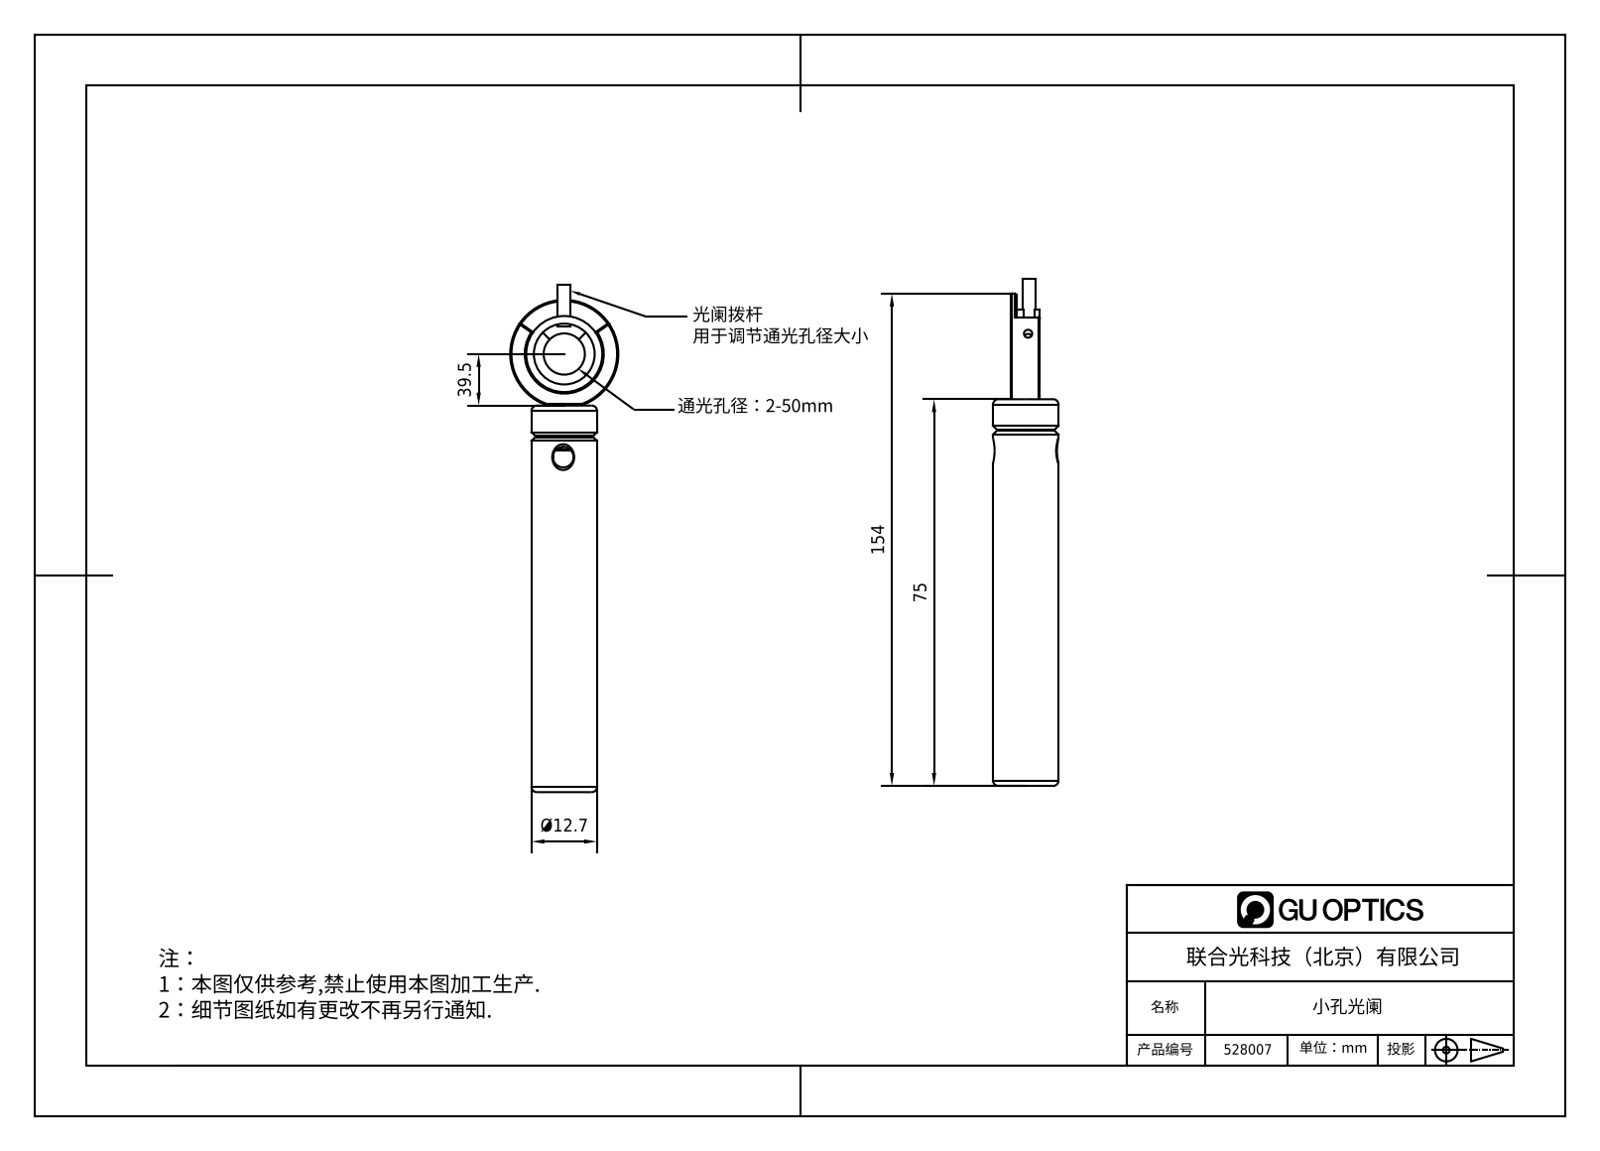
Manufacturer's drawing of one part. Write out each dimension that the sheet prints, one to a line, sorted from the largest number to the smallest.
154
75
39.5
Ø12.7
